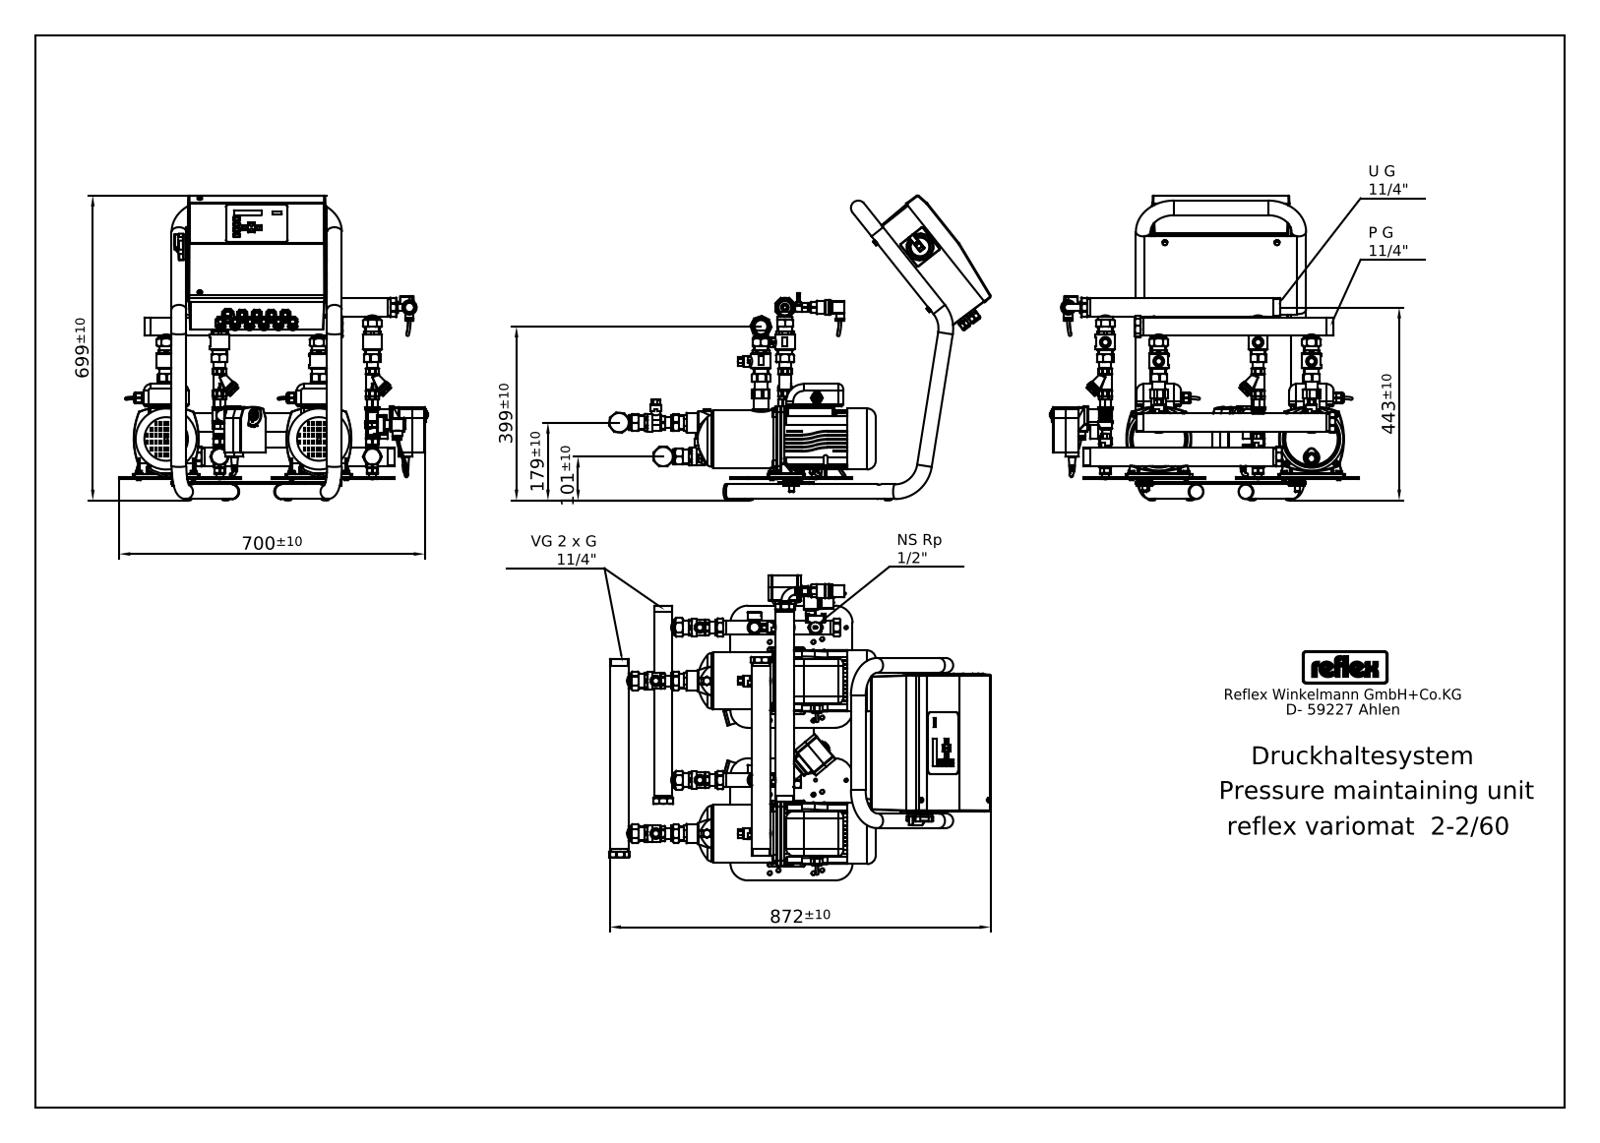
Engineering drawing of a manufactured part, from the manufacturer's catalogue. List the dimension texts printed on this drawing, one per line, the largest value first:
872±10
700±10
699±10
443±10
399±10
179±10
101±10
